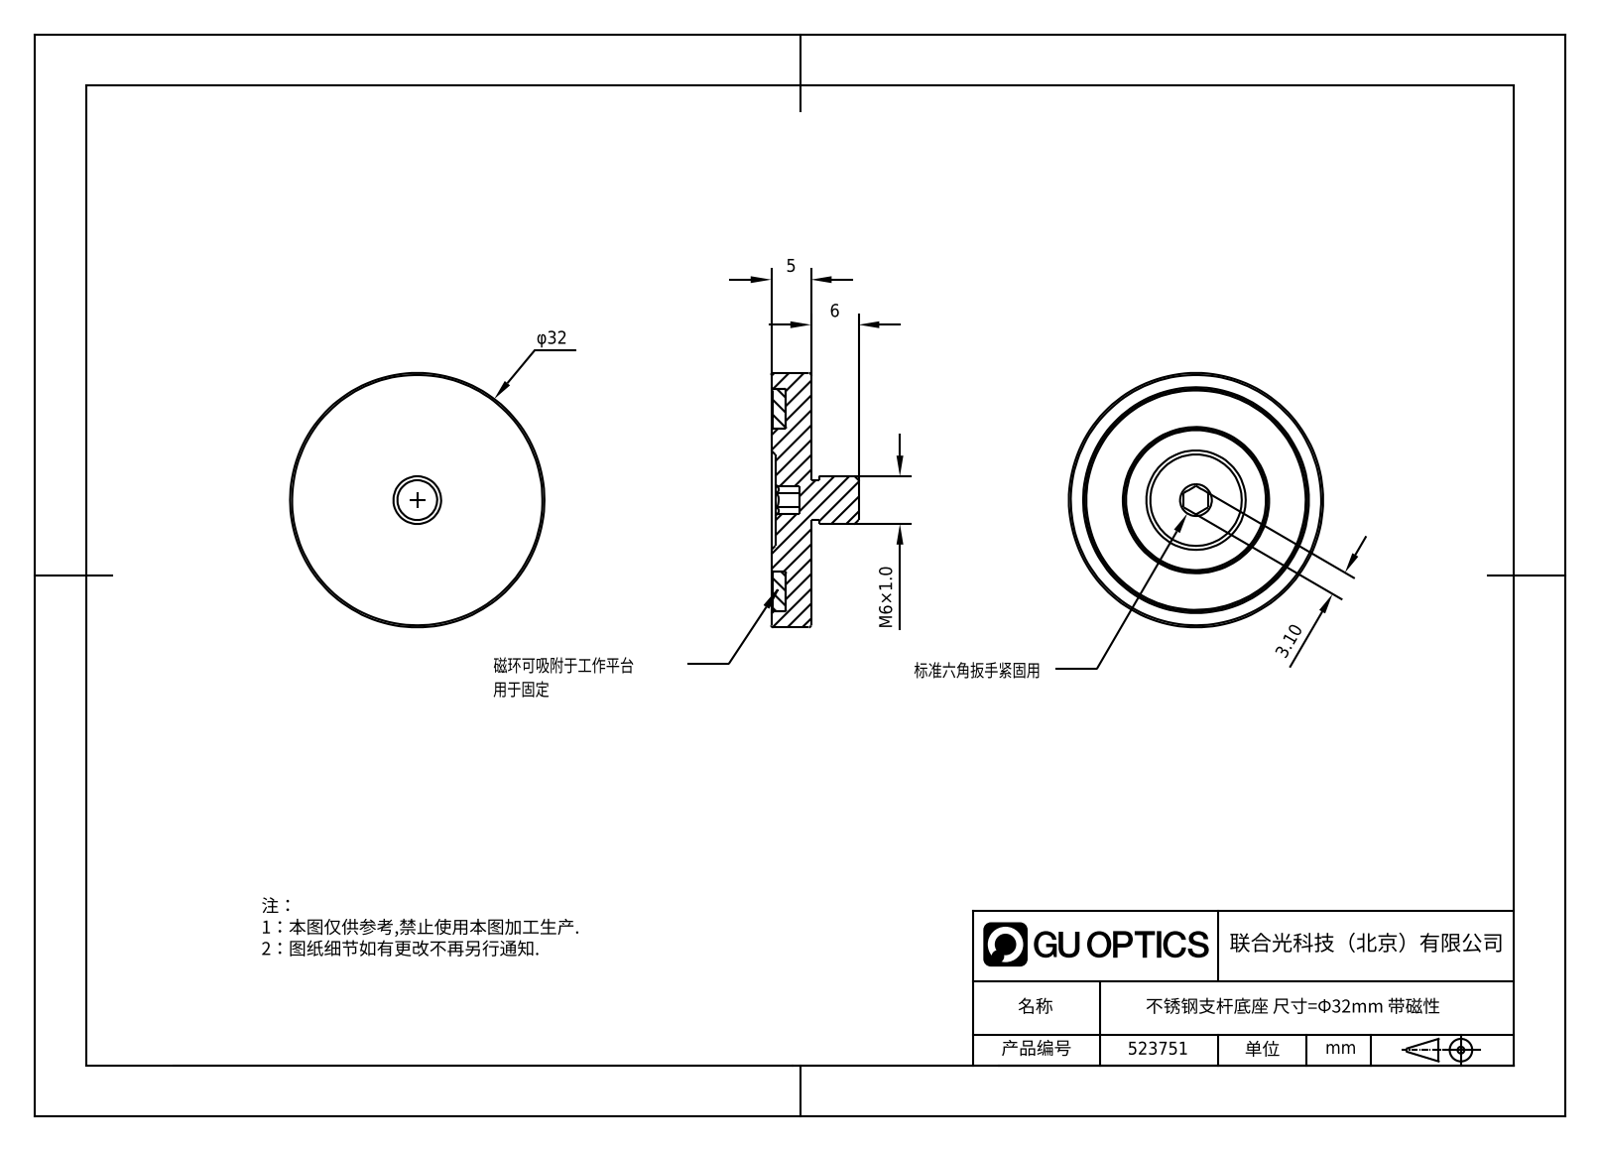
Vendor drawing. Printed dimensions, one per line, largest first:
M6×1.0
6
5
3.10
